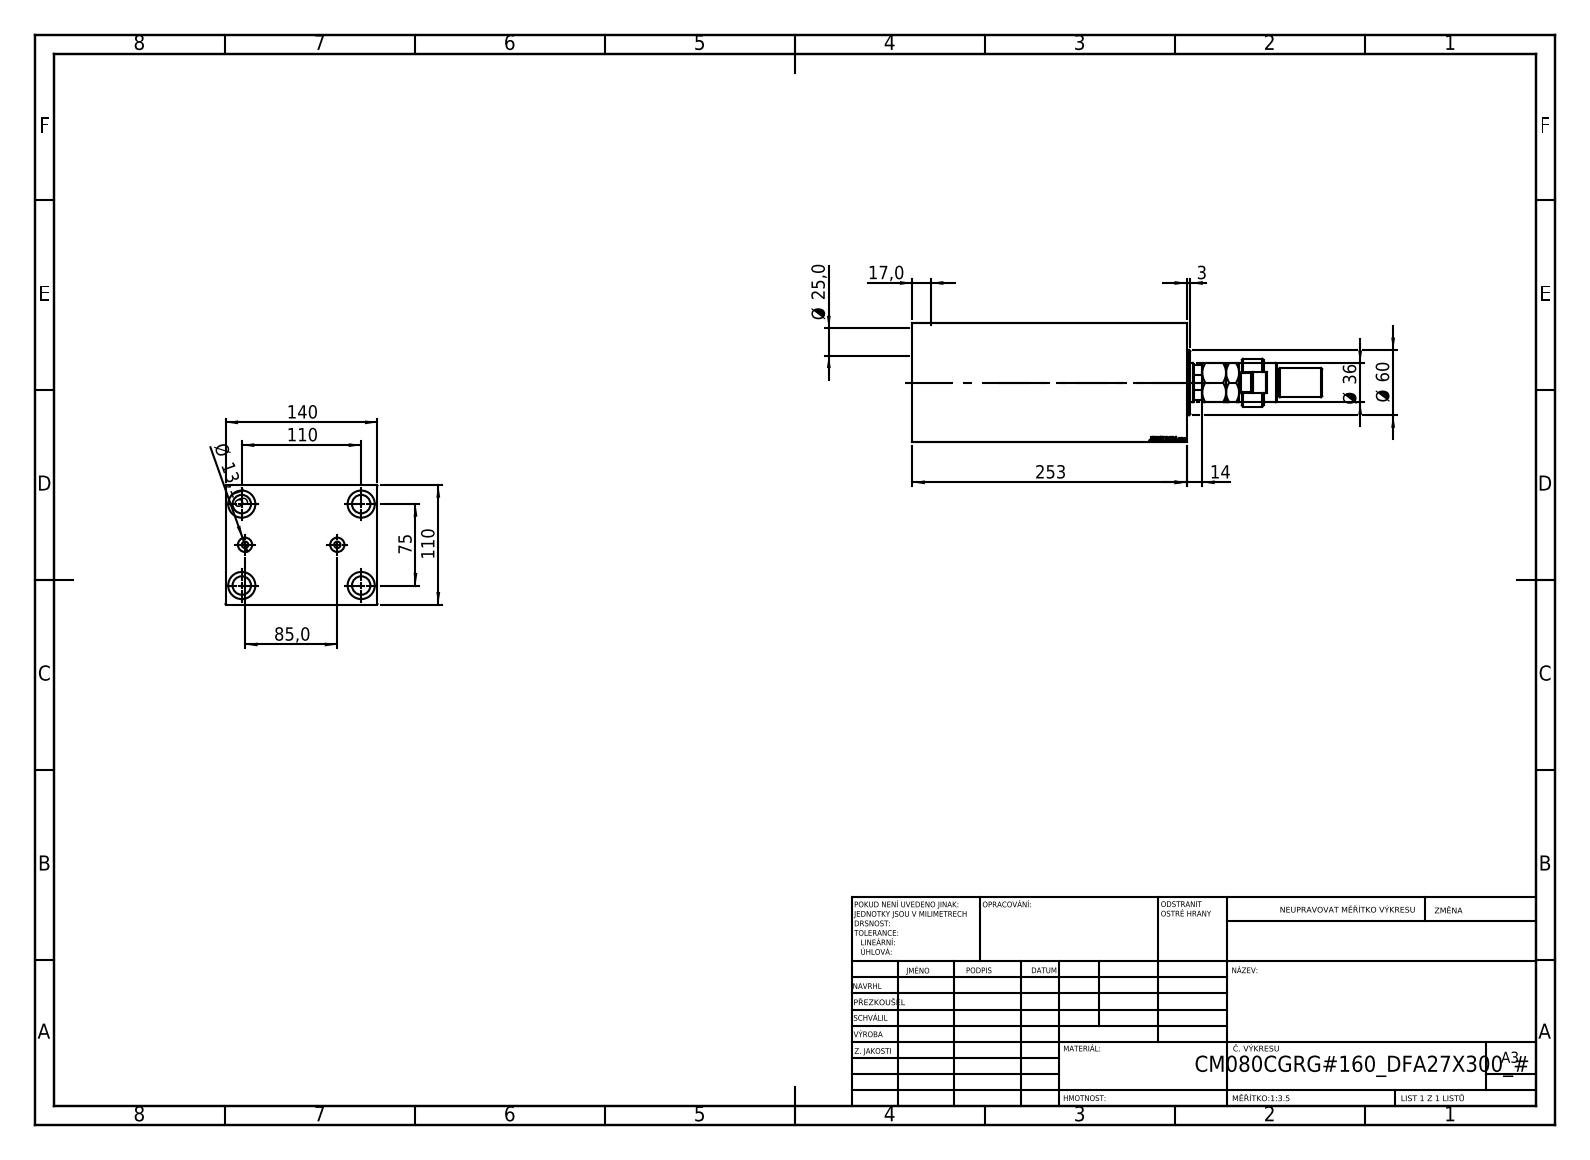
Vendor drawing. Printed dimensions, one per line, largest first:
253
140
110
110
85,0
75
Ø 60
Ø 36
Ø 25,0
17,0
14
Ø 13,16
3
